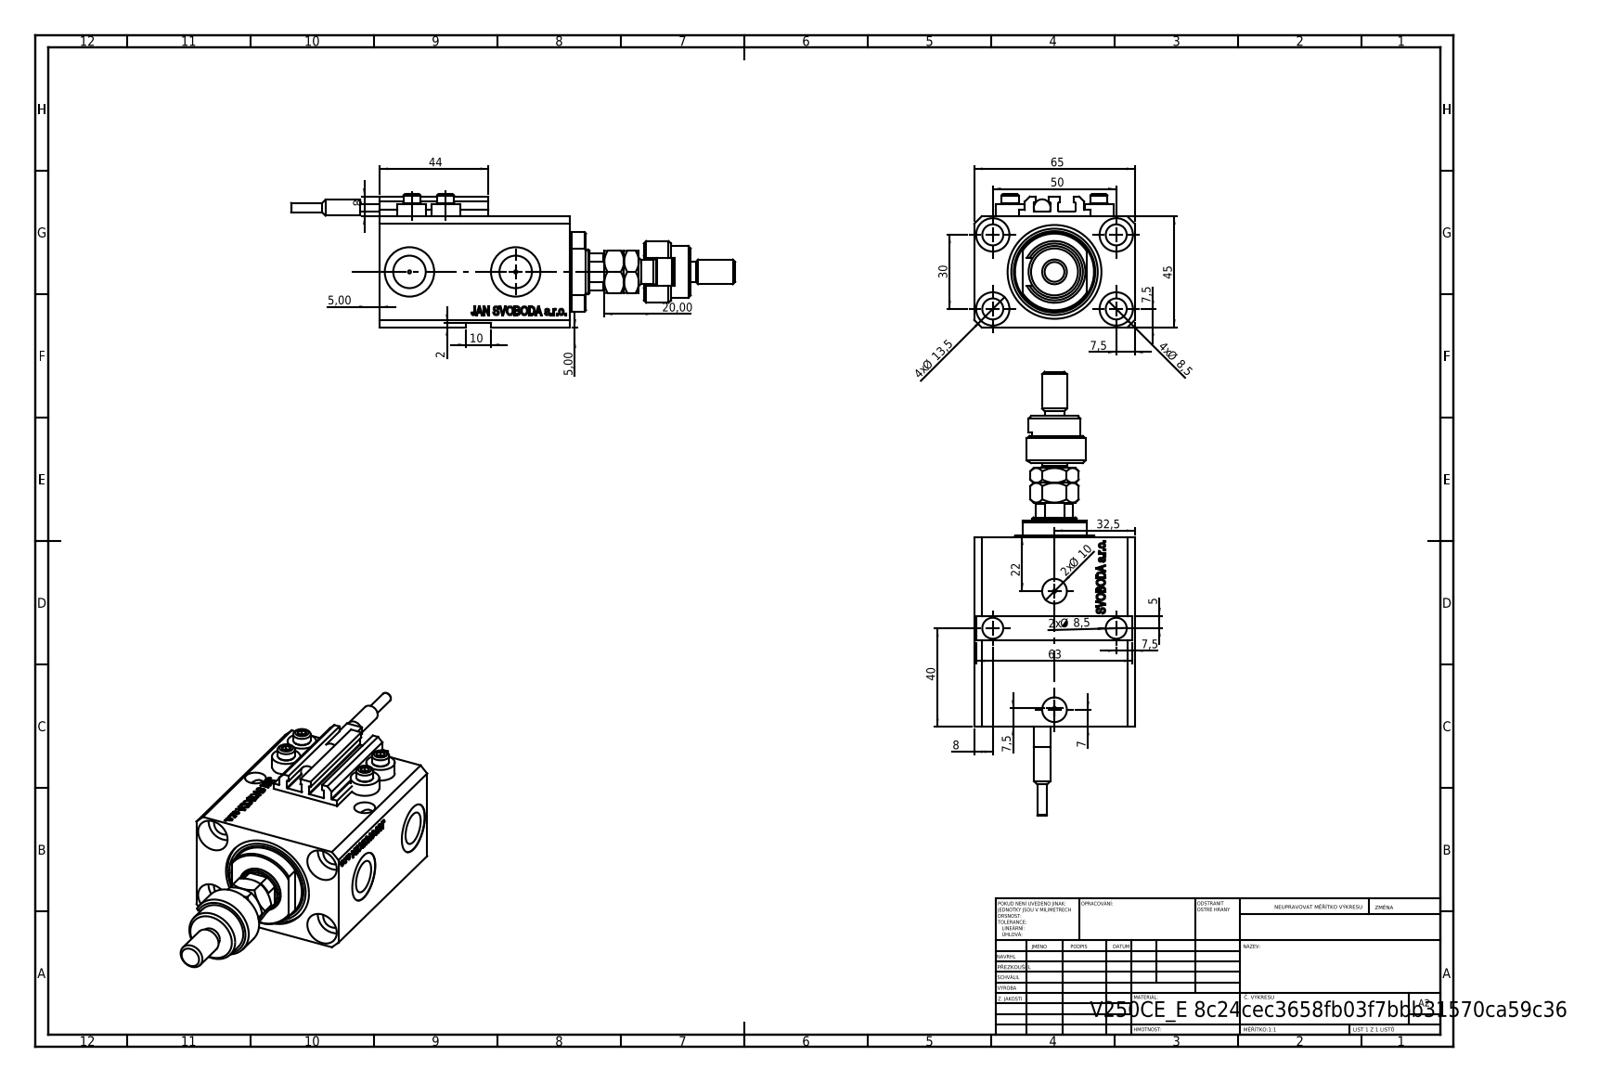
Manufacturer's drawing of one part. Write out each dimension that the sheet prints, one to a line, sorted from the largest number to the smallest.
65
63
50
45
44
40
32,5
30
22
20,00
4x Ø 13,5
10
2x Ø 10
4x Ø 8,5
2x Ø 8,5
8
8
7,5
7,5
7,5
7,5
7
5,00
5,00
5
2
